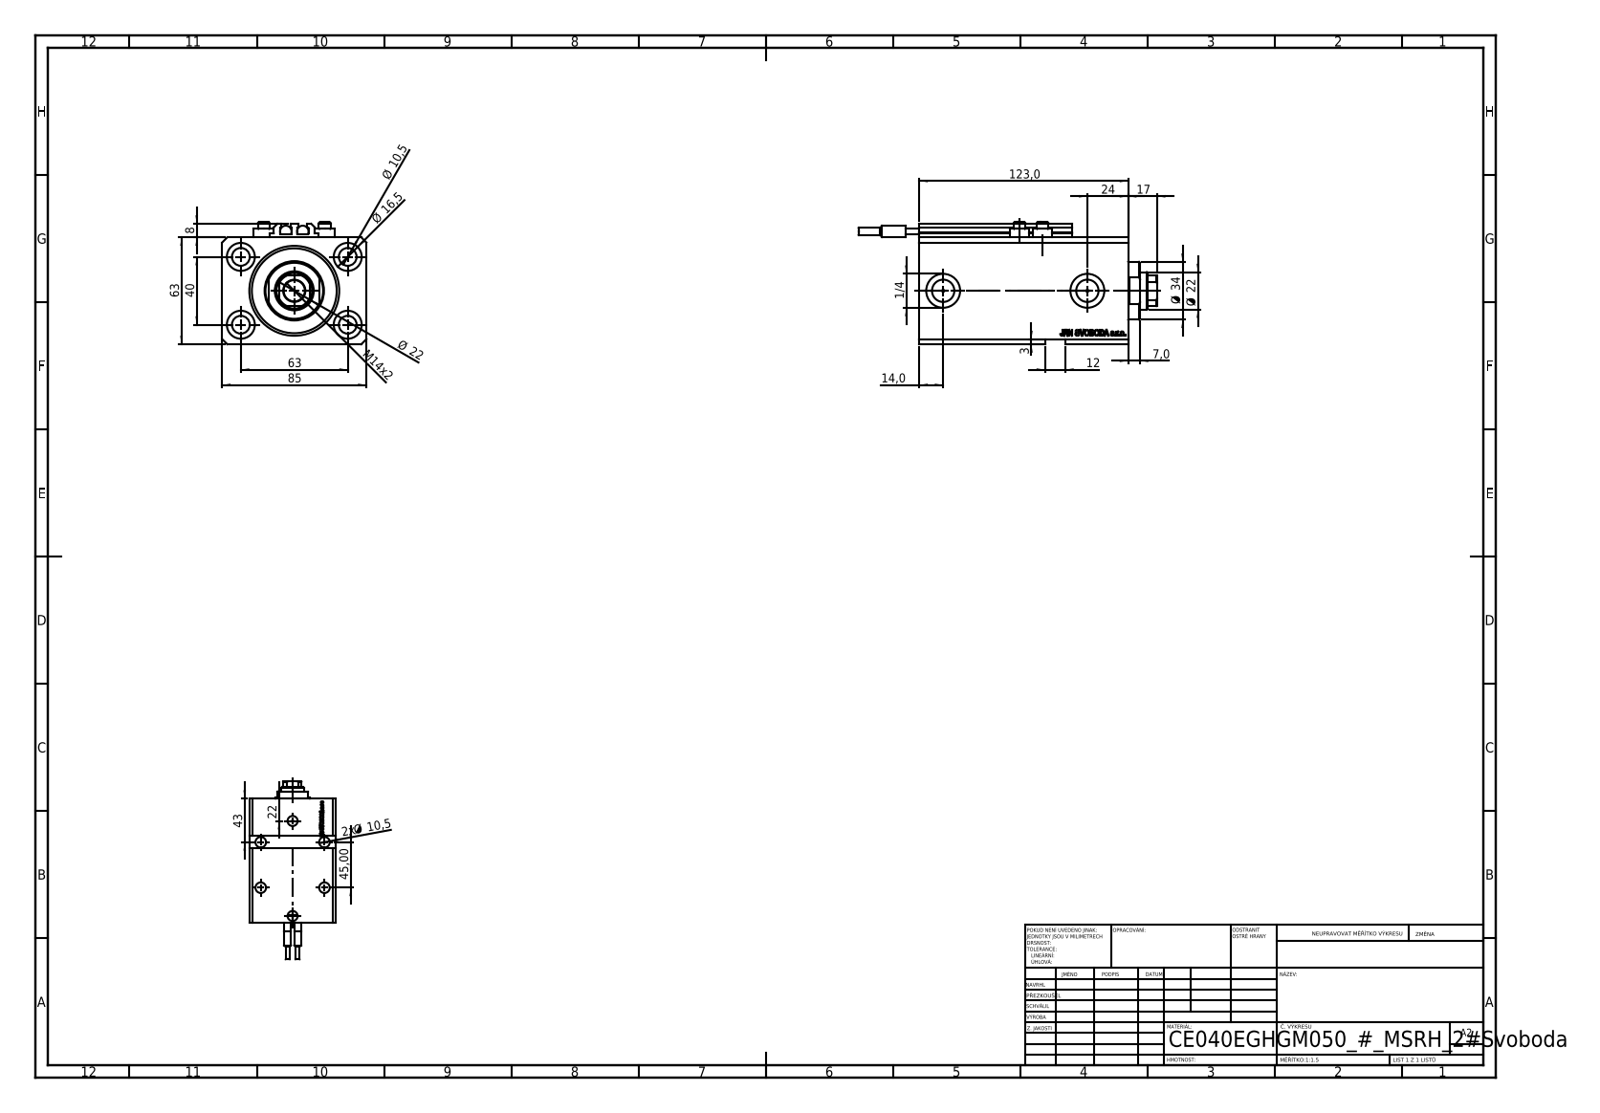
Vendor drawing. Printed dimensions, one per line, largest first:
123,0
85
63
63
45,00
43
40
Ø 34
24
Ø 22
Ø 22
22
17
Ø 16,5
M14x2
14,0
12
Ø 10,5
2x Ø 10,5
8
7,0
3
1/4
